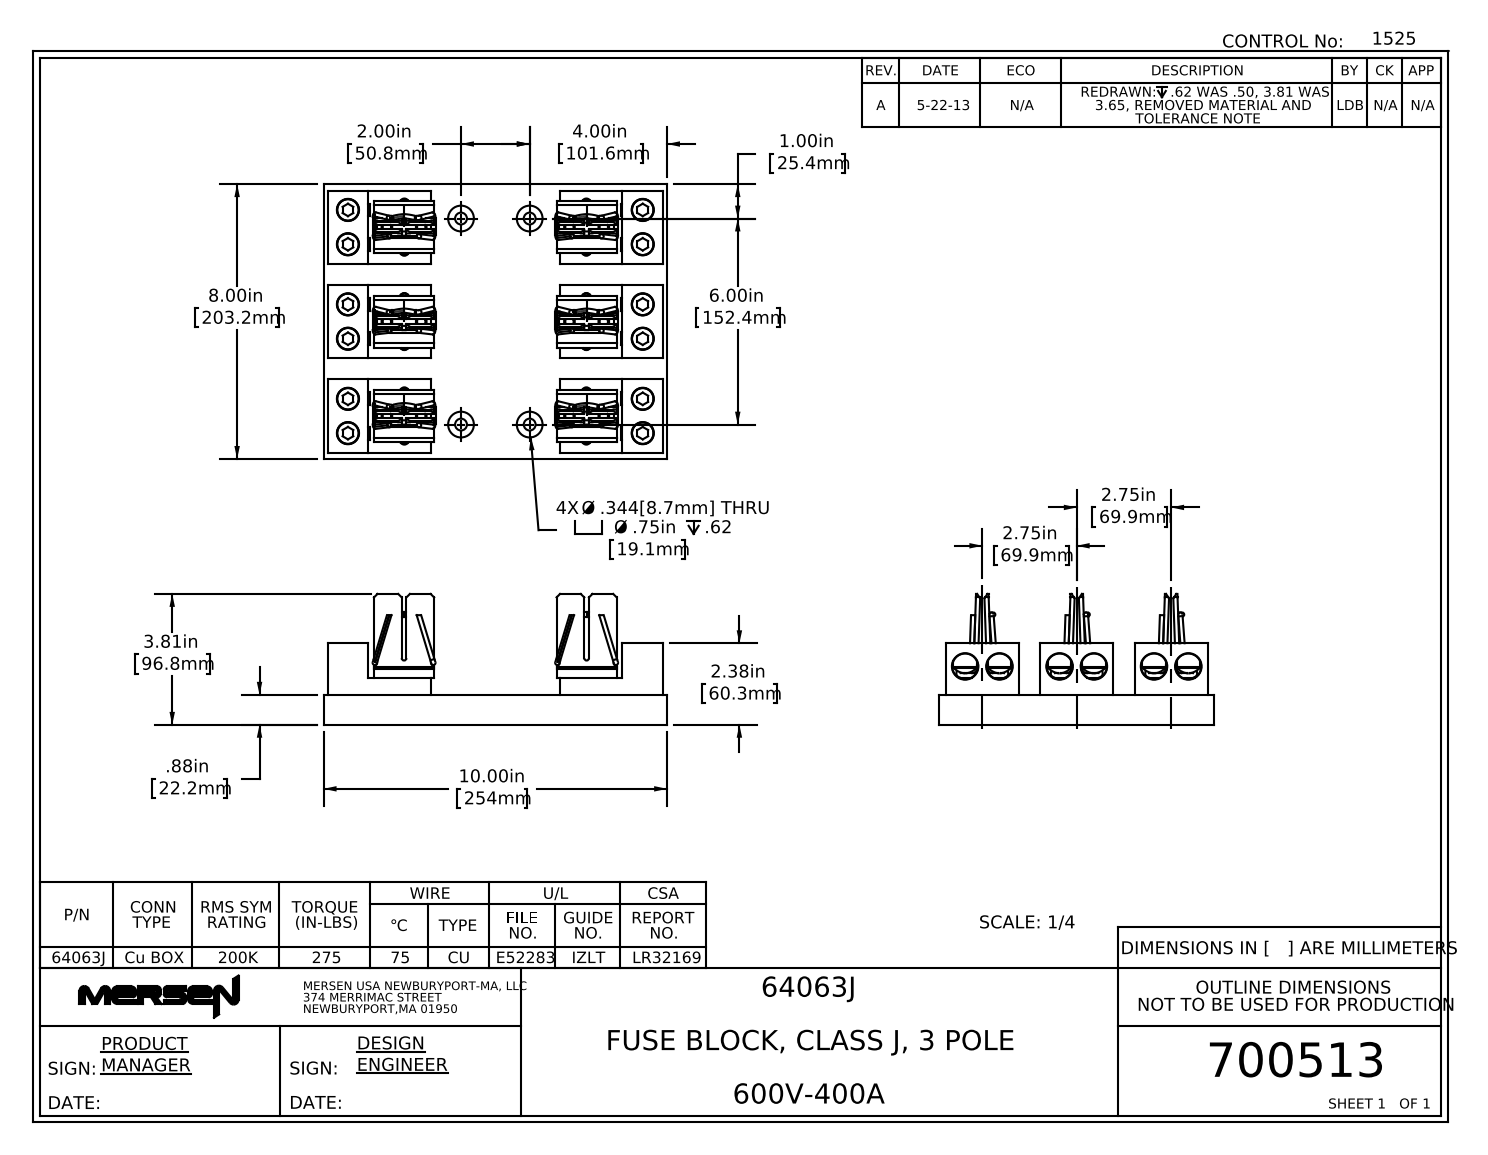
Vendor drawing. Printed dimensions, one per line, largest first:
10.00in 254mm
8.00in 203.2mm
6.00in 152.4mm
4.00in 101.6mm
3.81in 96.8mm
2.75in 69.9mm
2.75in 69.9mm
2.38in 60.3mm
2.00in 50.8mm
1.00in 25.4mm
.88in 22.2mm
4X Ø .344[8.7mm] THRU Ø .75in 19.1mm .62
